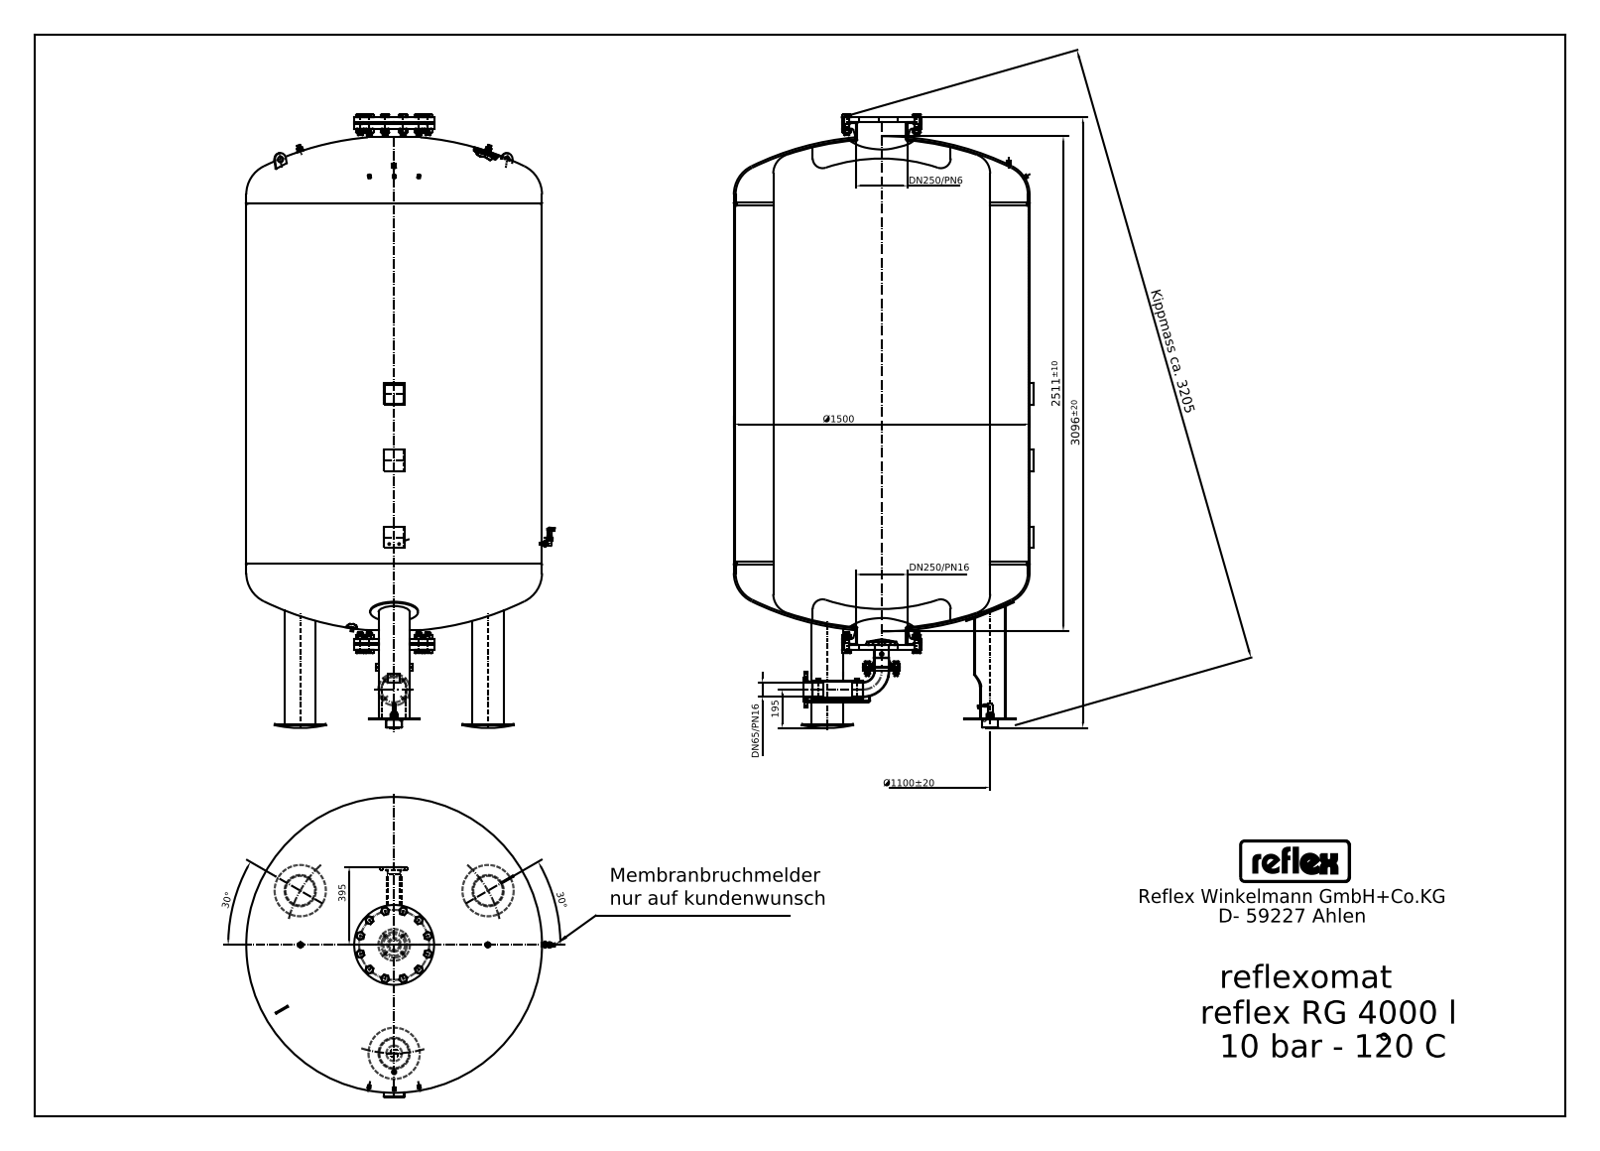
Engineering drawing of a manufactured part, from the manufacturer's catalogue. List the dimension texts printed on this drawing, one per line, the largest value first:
Kippmass ca. 3205
3096±20
2511±10
Ø1500
Ø1100±20
395
DN250/PN6
DN250/PN16
195
DN65/PN16
30°
30°
